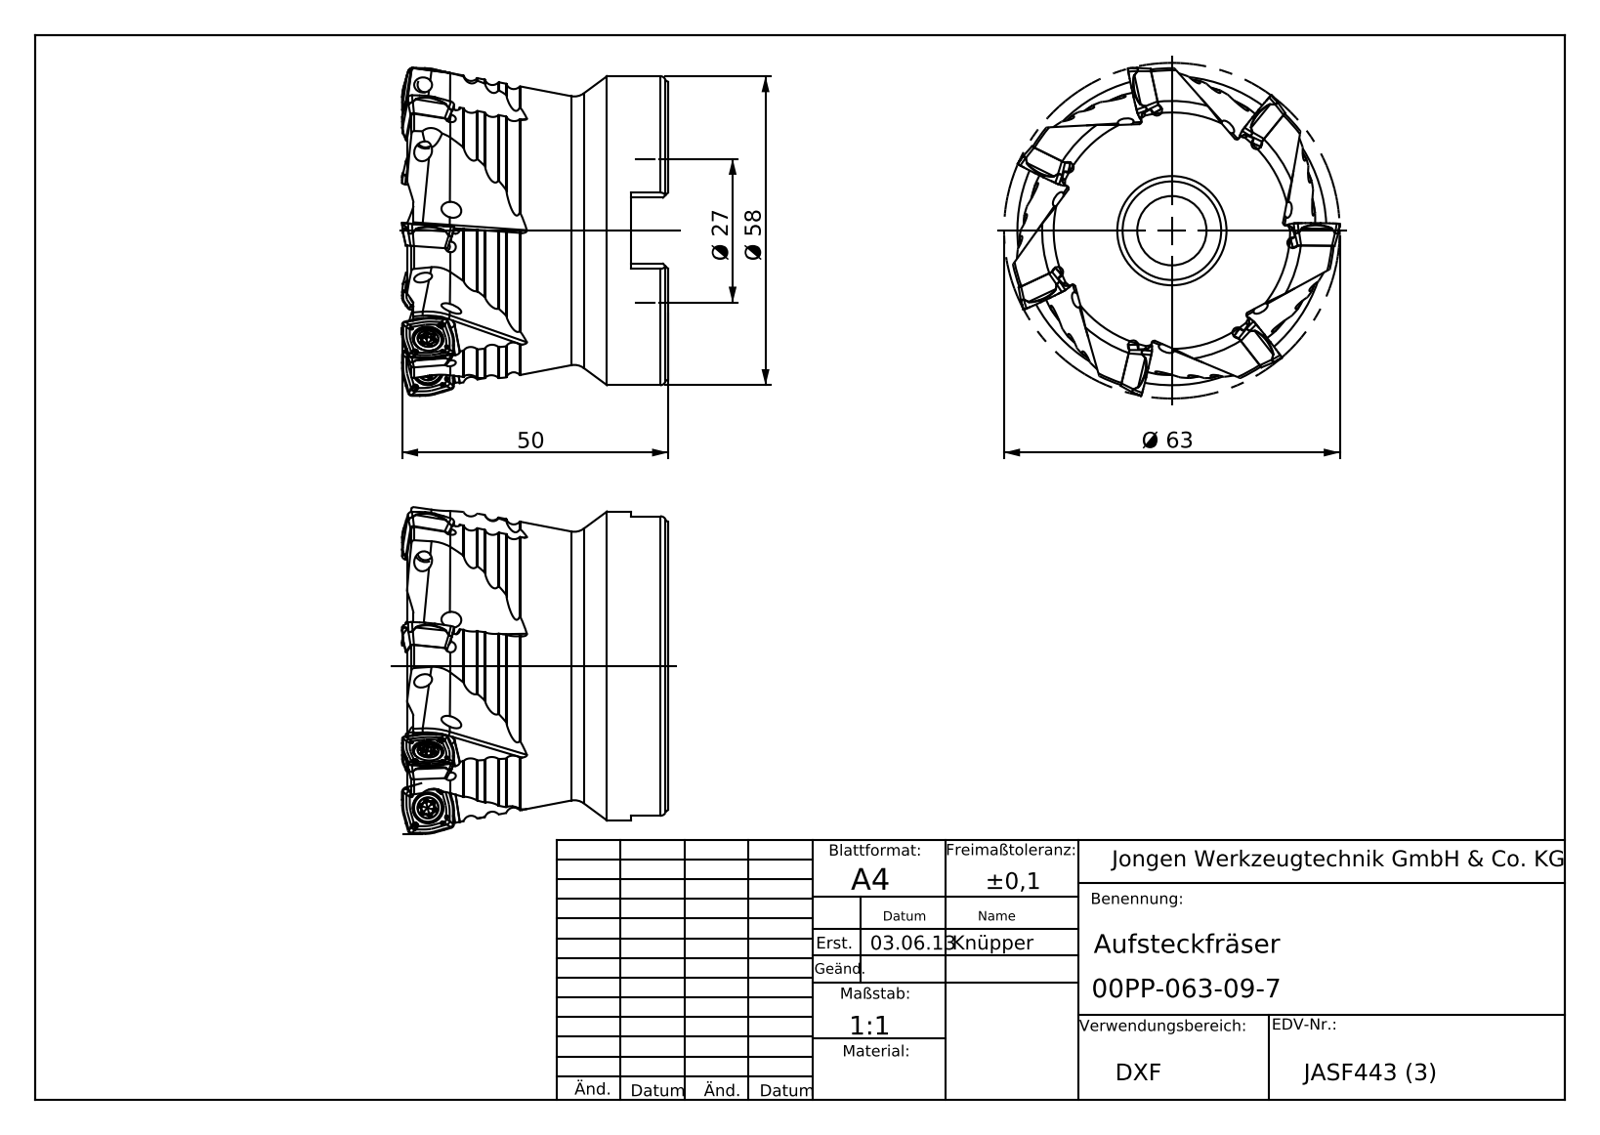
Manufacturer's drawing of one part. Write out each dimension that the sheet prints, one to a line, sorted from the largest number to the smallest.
Ø 63
Ø 58
50
Ø 27
